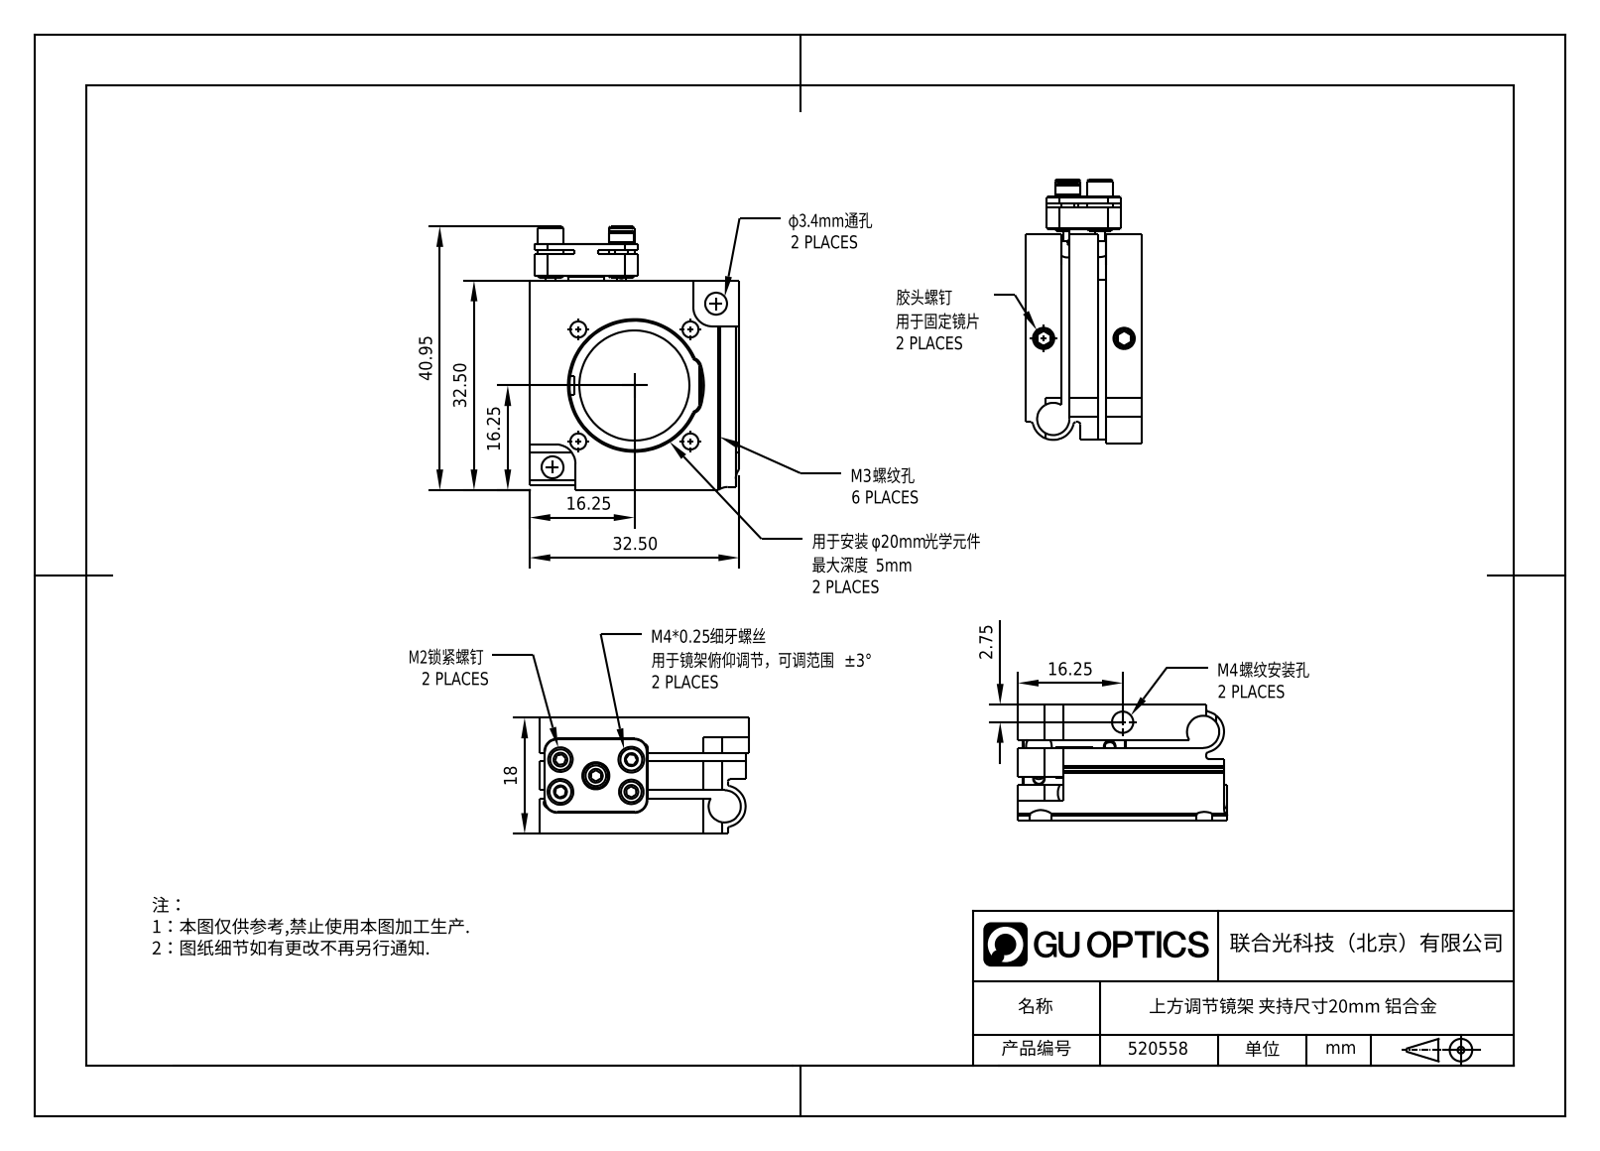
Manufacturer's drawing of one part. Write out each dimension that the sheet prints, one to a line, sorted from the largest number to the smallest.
40.95
32.50
32.50
18
16.25
16.25
16.25
2.75
